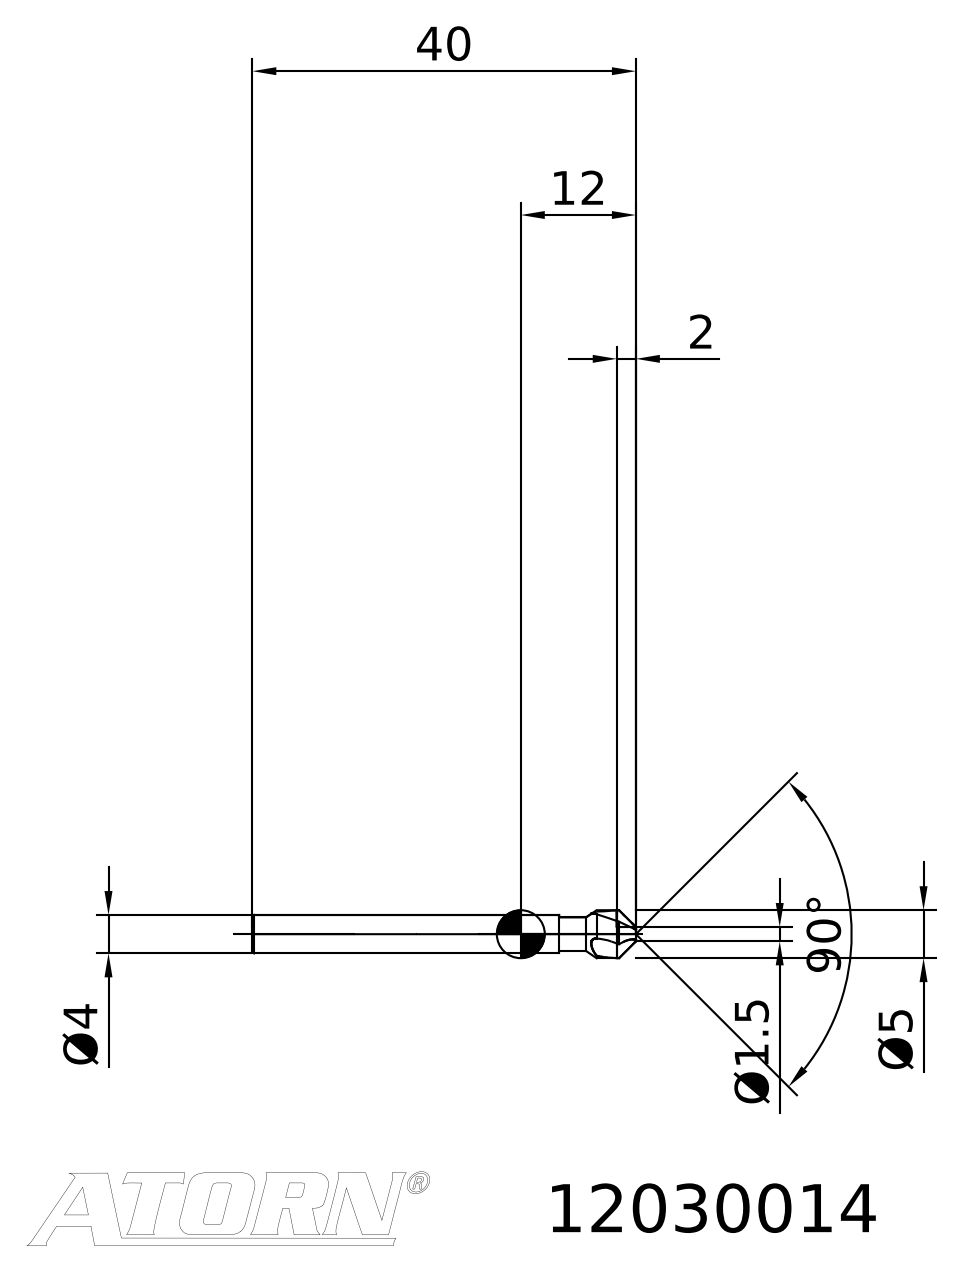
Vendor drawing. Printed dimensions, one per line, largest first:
90°
40
12
Ø5
Ø4
2
Ø1.5
